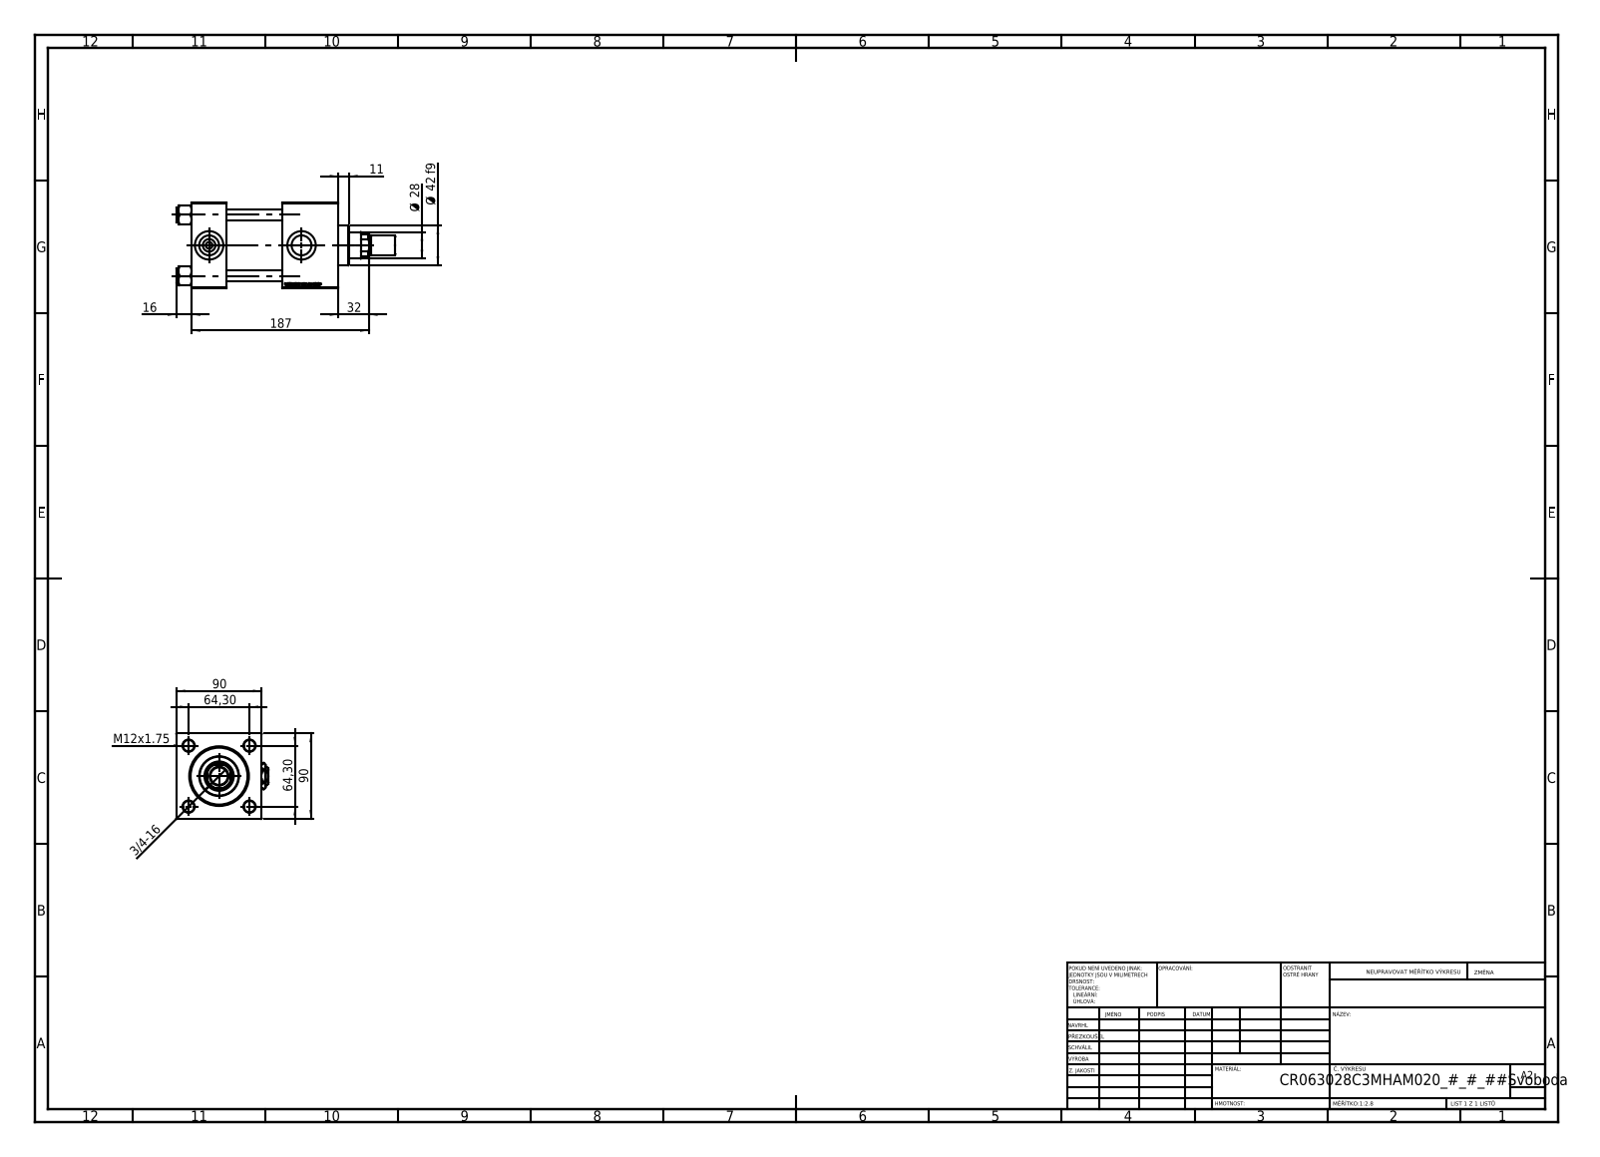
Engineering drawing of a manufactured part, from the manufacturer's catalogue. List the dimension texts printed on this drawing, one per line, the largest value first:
187
90
90
64,30
64,30
Ø 42 f9
32
Ø 28
16
M12x1.75
11
3/4-16
